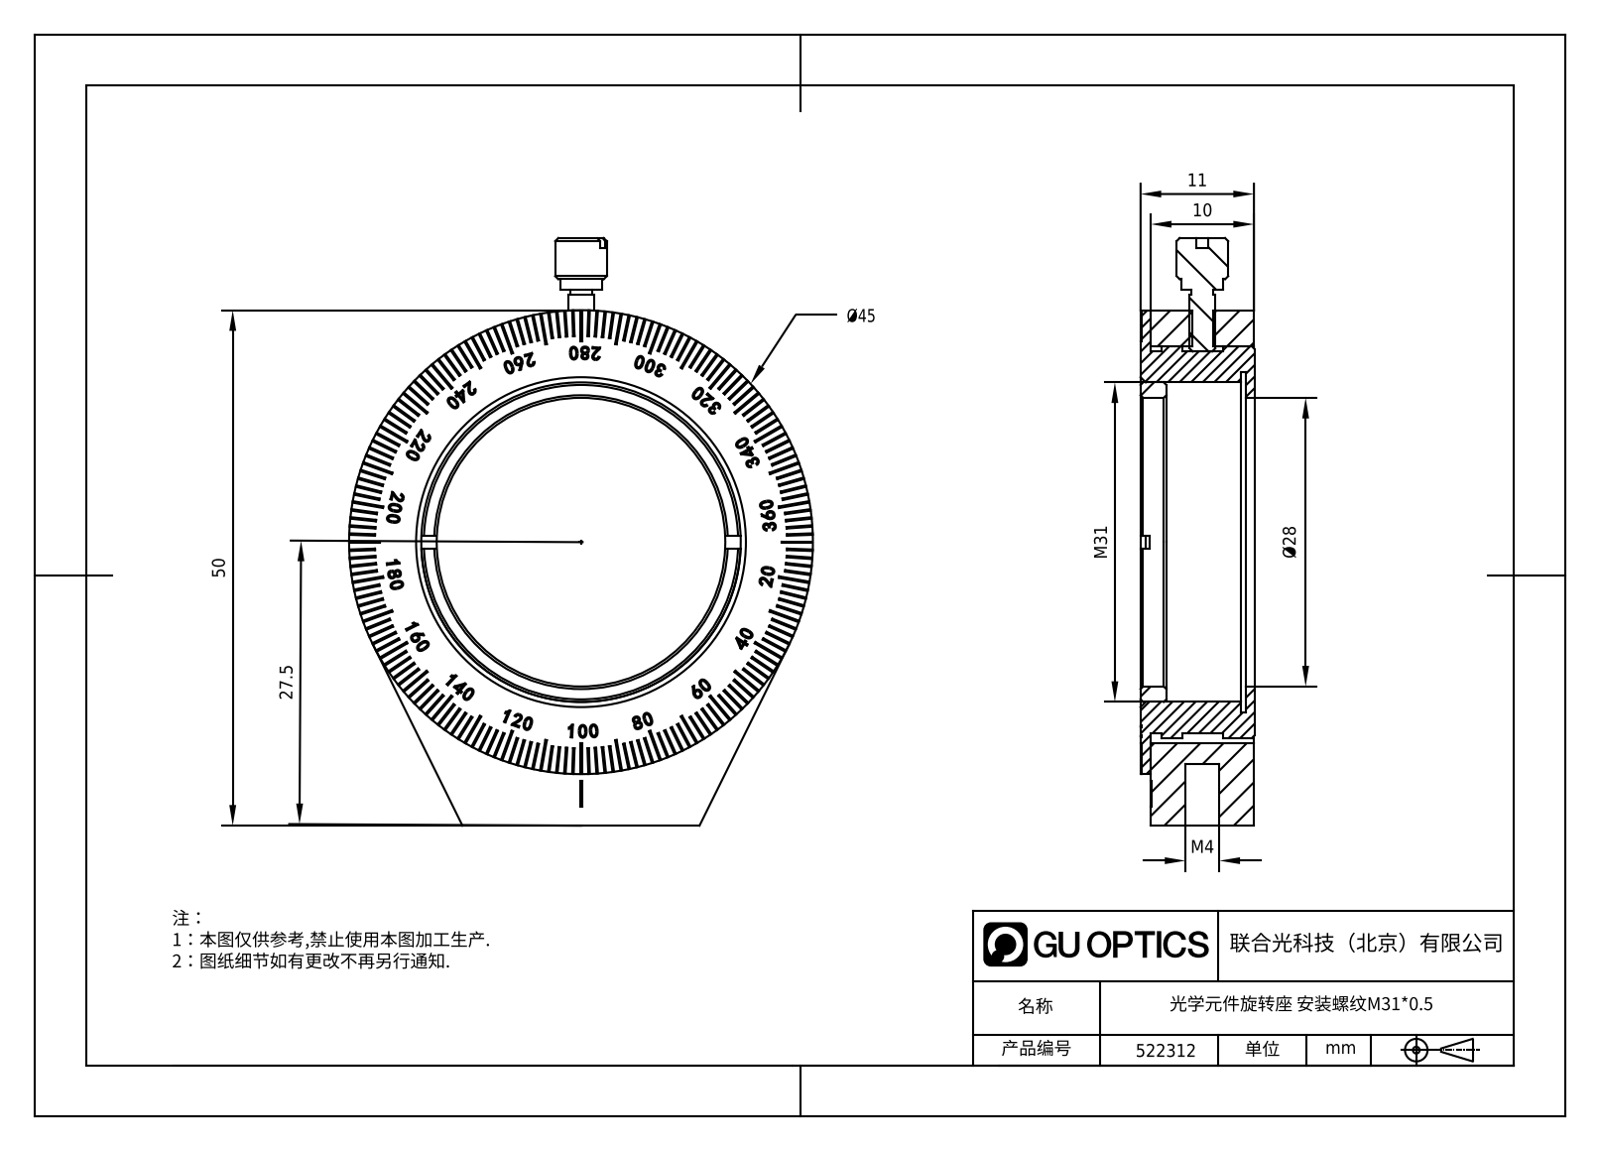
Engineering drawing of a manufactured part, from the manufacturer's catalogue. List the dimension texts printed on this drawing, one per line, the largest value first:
50
M31
Ø28
27.5
11
10
M4
